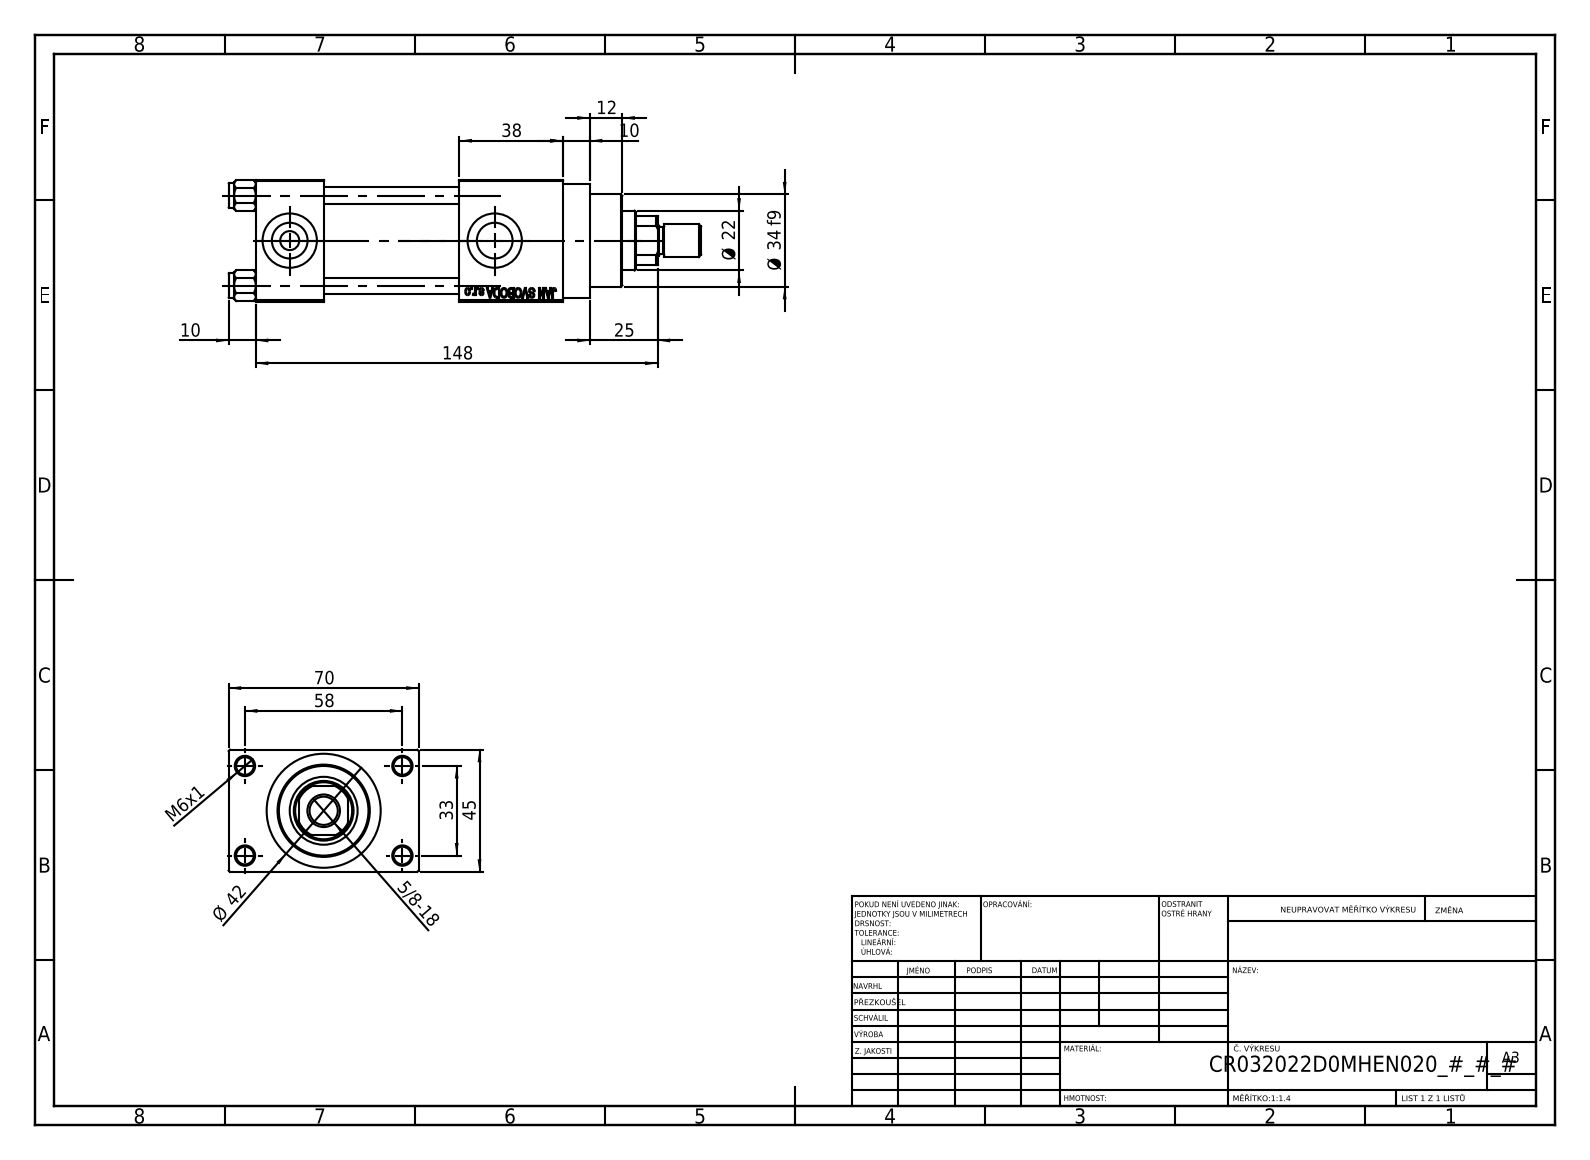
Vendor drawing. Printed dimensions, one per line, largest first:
148
70
58
45
Ø 42
38
Ø 34 f9
33
25
Ø 22
12
10
10
M6x1
5/8-18
